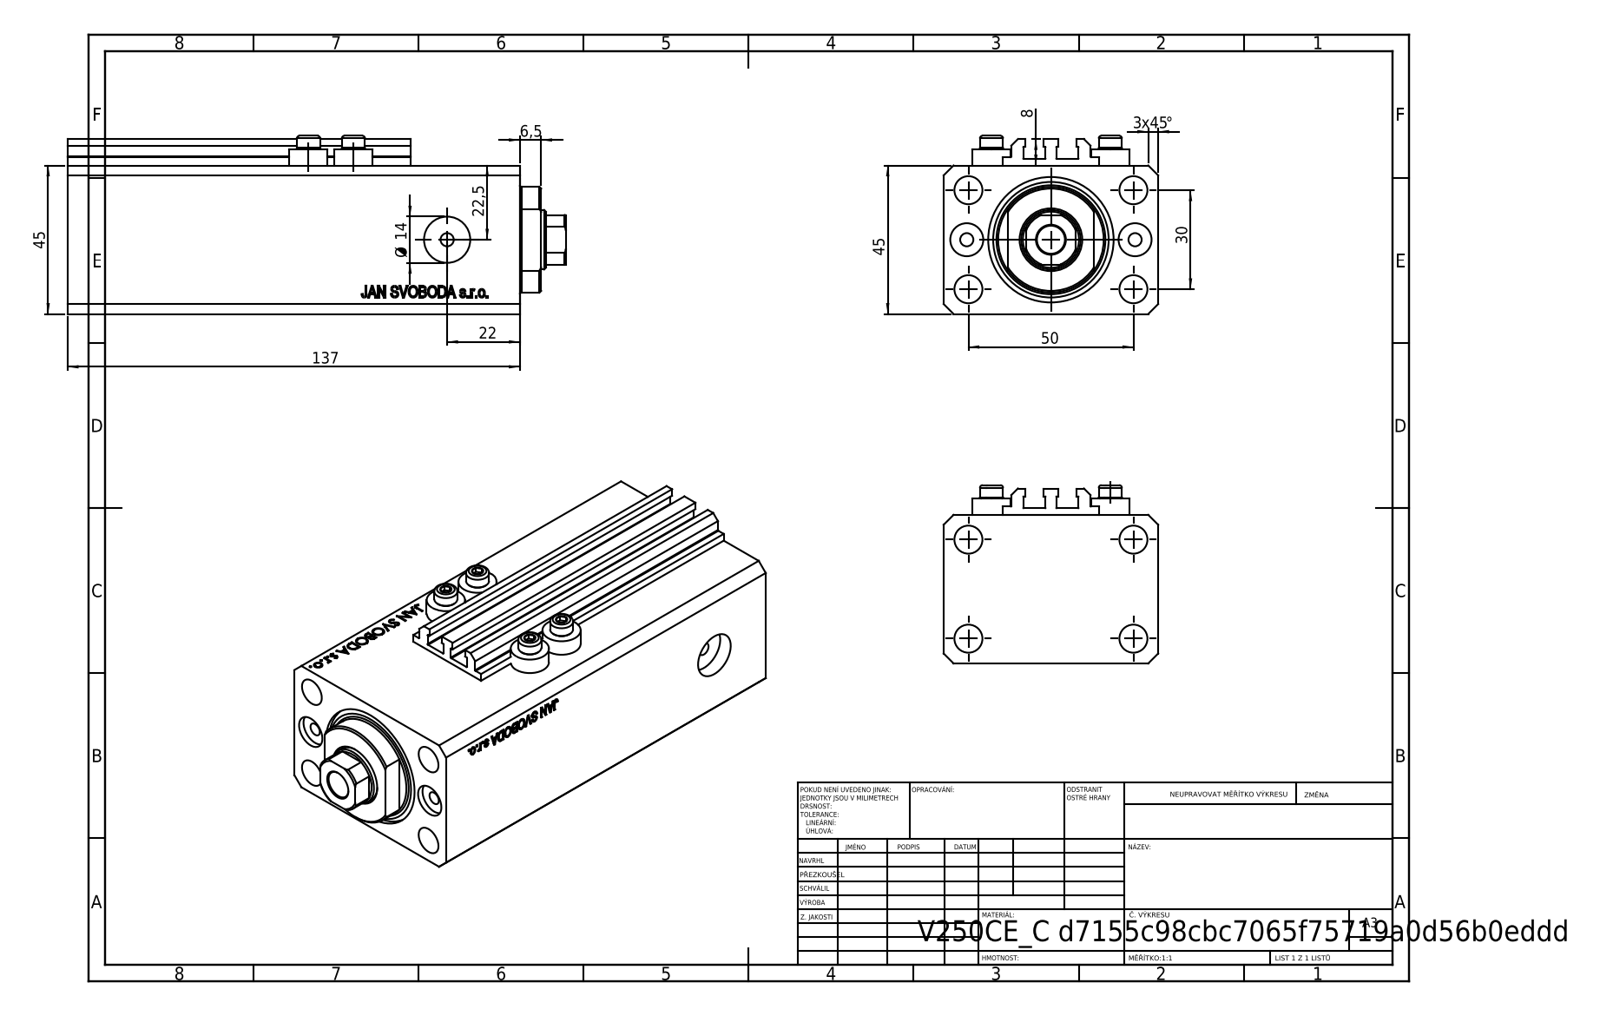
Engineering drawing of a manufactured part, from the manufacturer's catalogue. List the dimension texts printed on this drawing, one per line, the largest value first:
137
50
45
3 x45 °
45
30
22,5
22
Ø 14
8
6,5
